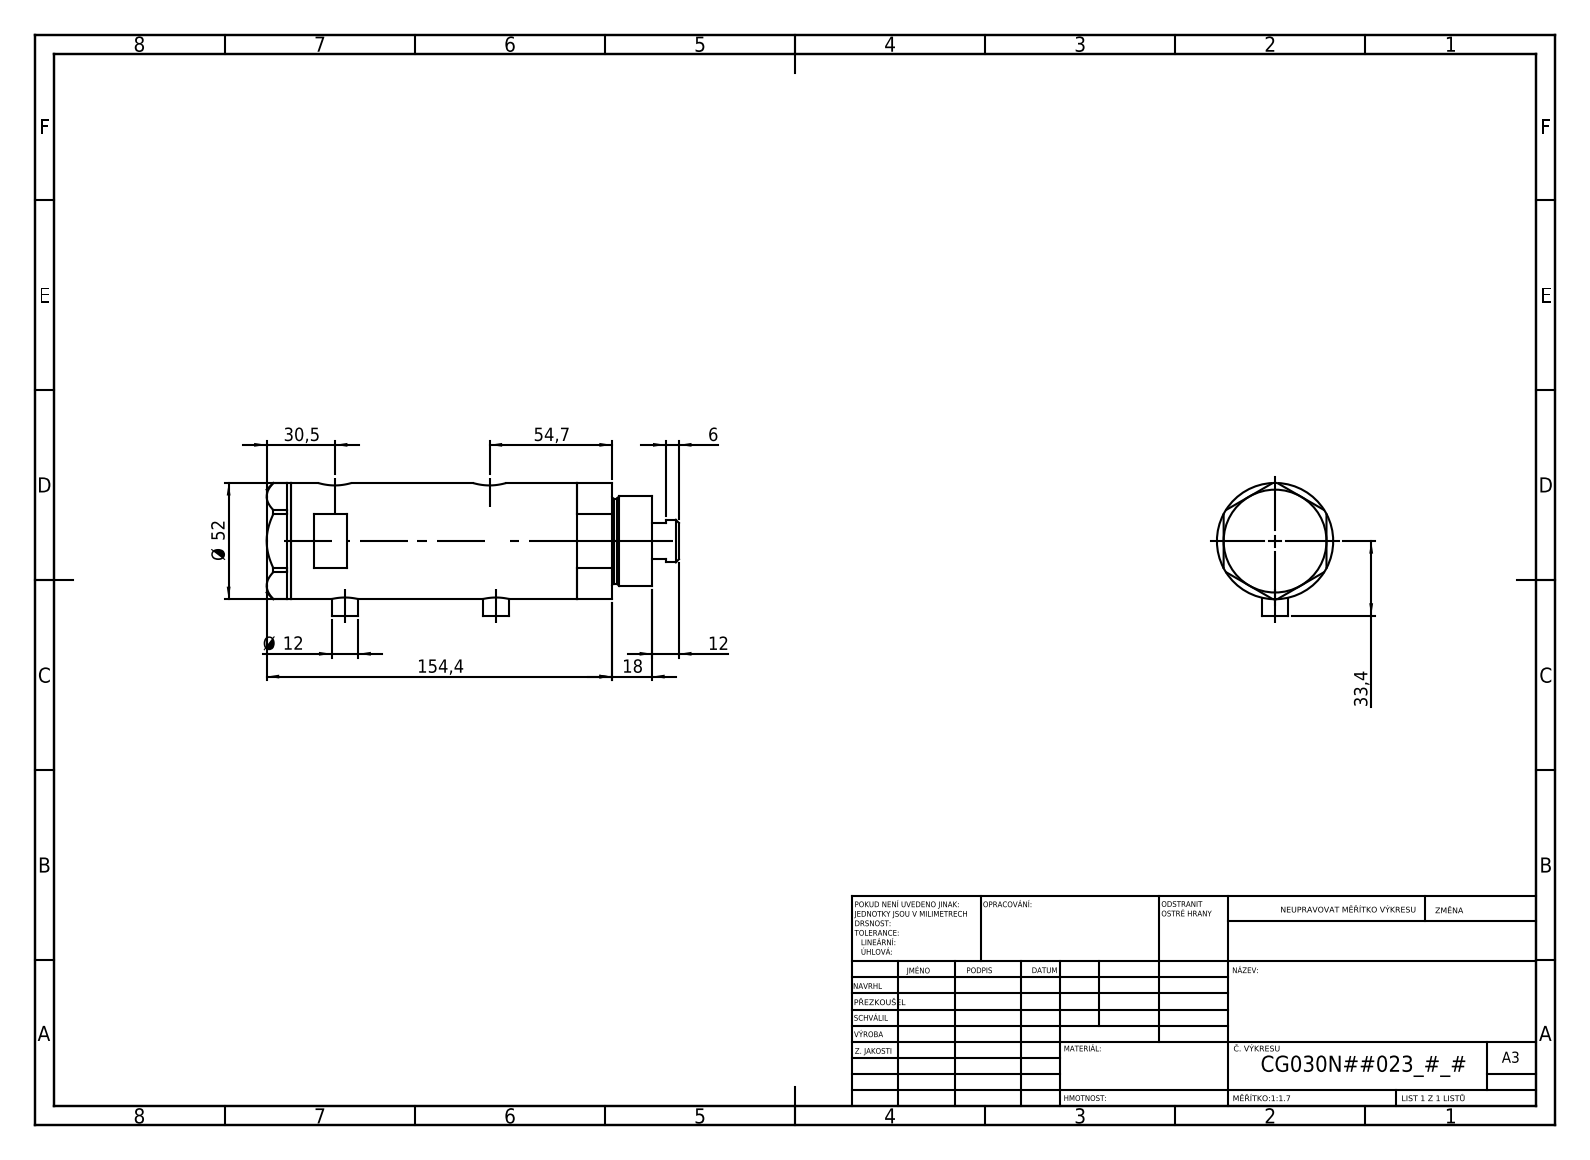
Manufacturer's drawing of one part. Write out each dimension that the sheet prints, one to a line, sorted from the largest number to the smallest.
154,4
54,7
Ø 52
33,4
30,5
18
12
Ø 12
6
